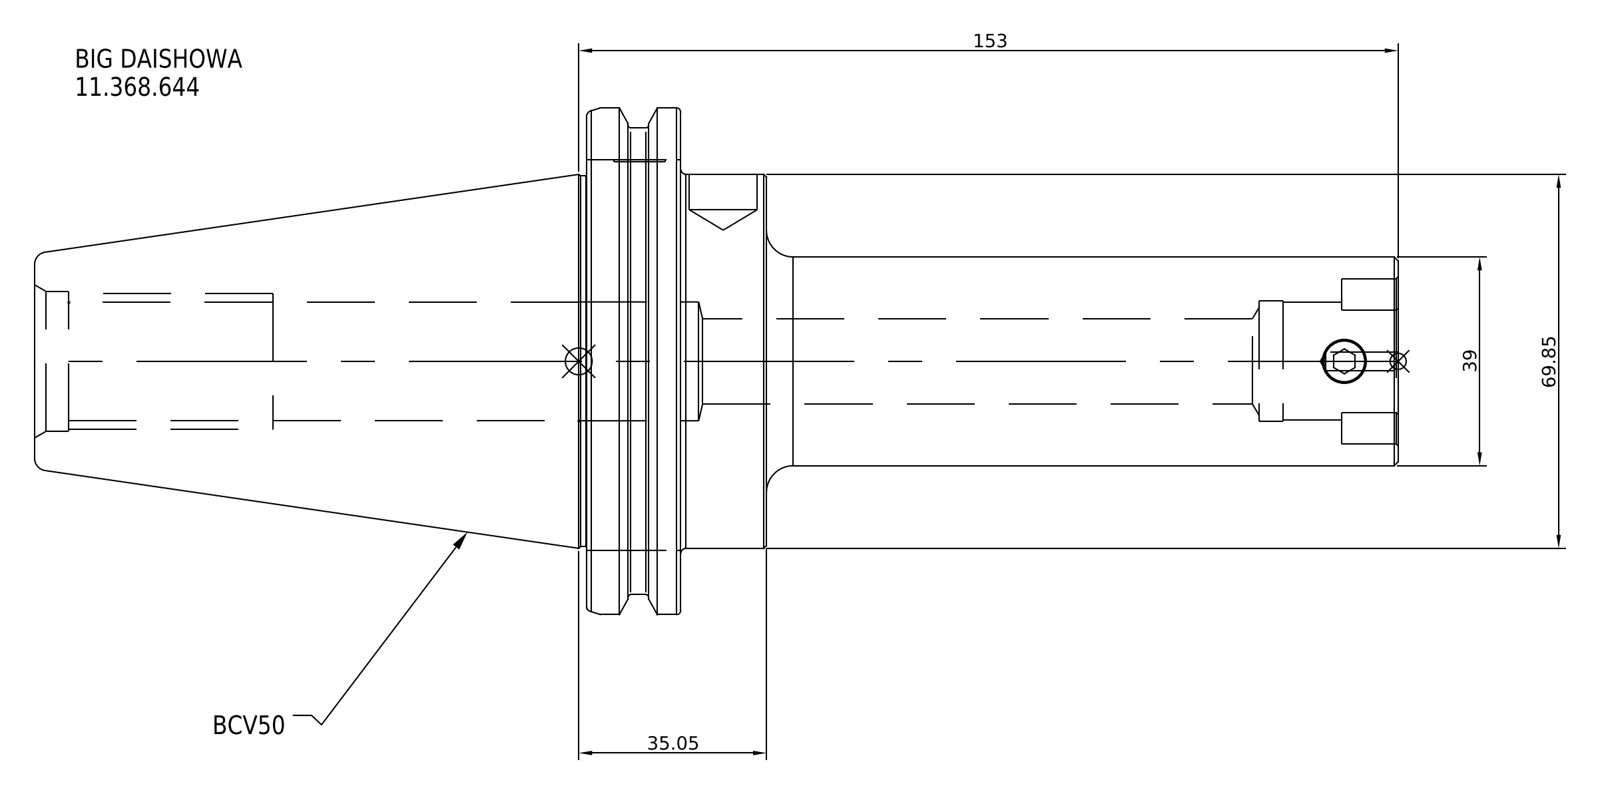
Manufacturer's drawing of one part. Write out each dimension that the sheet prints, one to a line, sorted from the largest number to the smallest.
153
69.85
39
35.05
